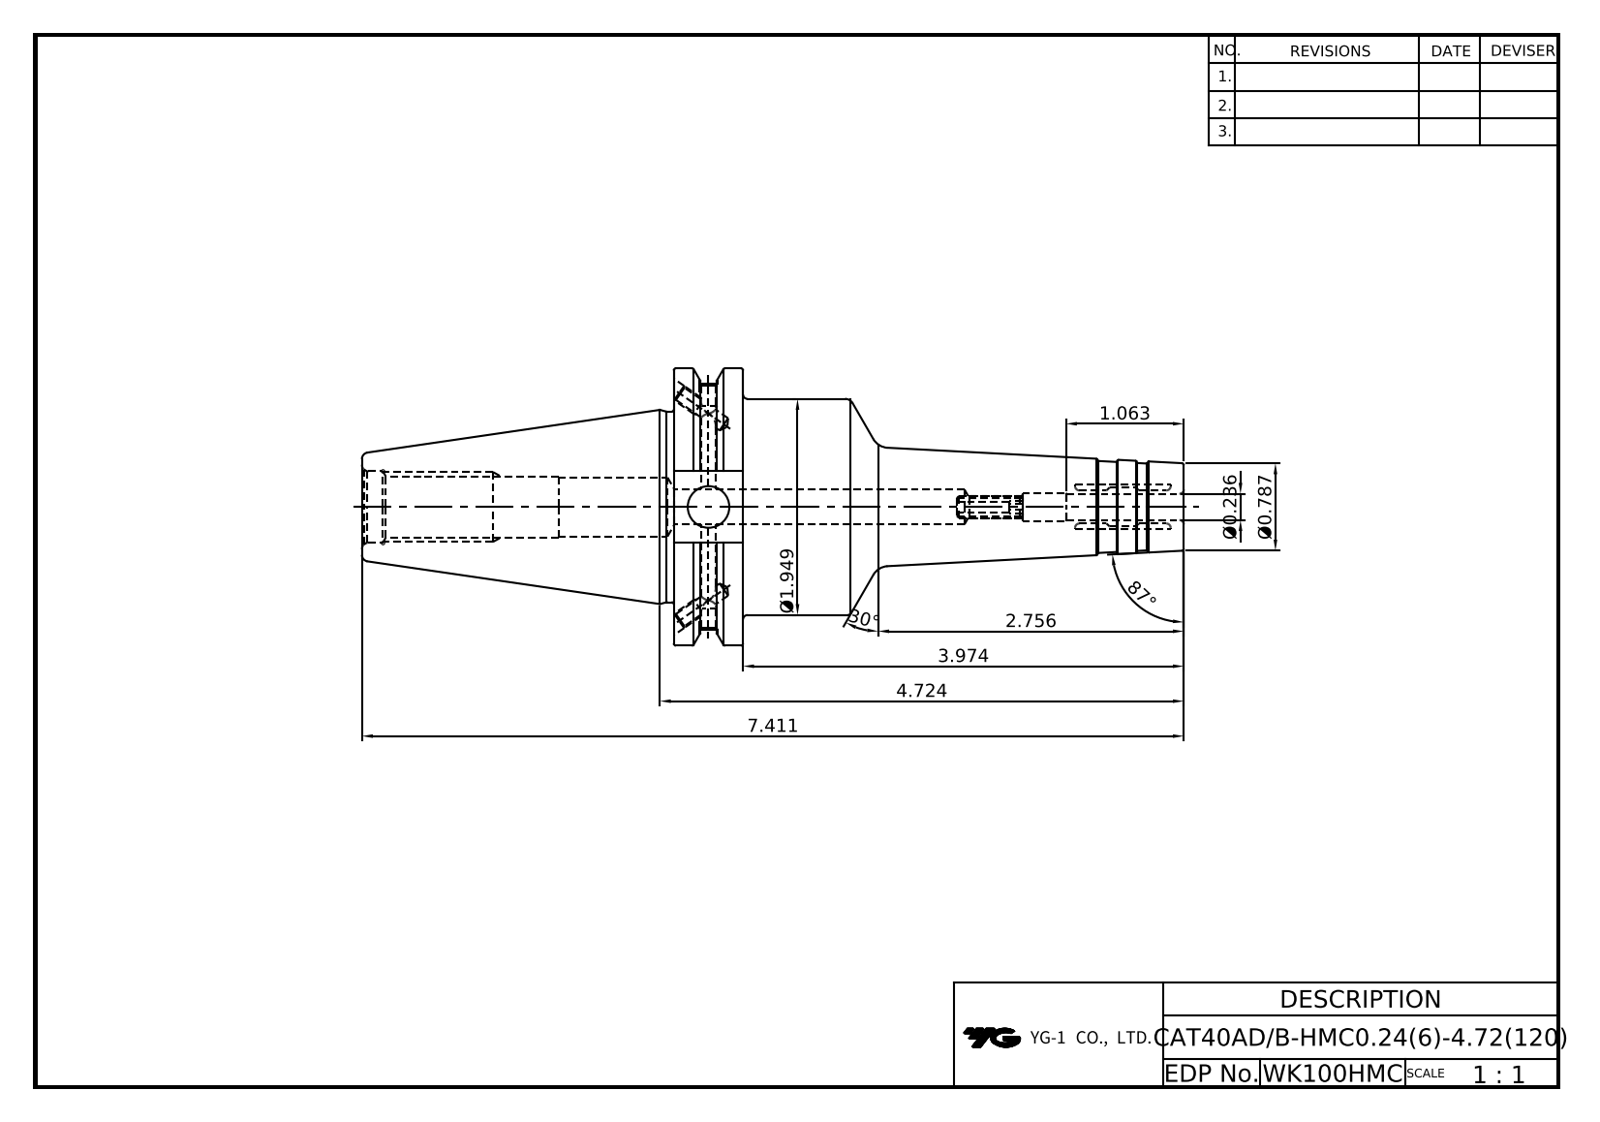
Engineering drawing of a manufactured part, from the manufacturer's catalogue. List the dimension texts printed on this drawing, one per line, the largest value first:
87°
30°
7.411
4.724
3.974
2.756
Ø1.949
1.063
Ø0.787
Ø0.236
